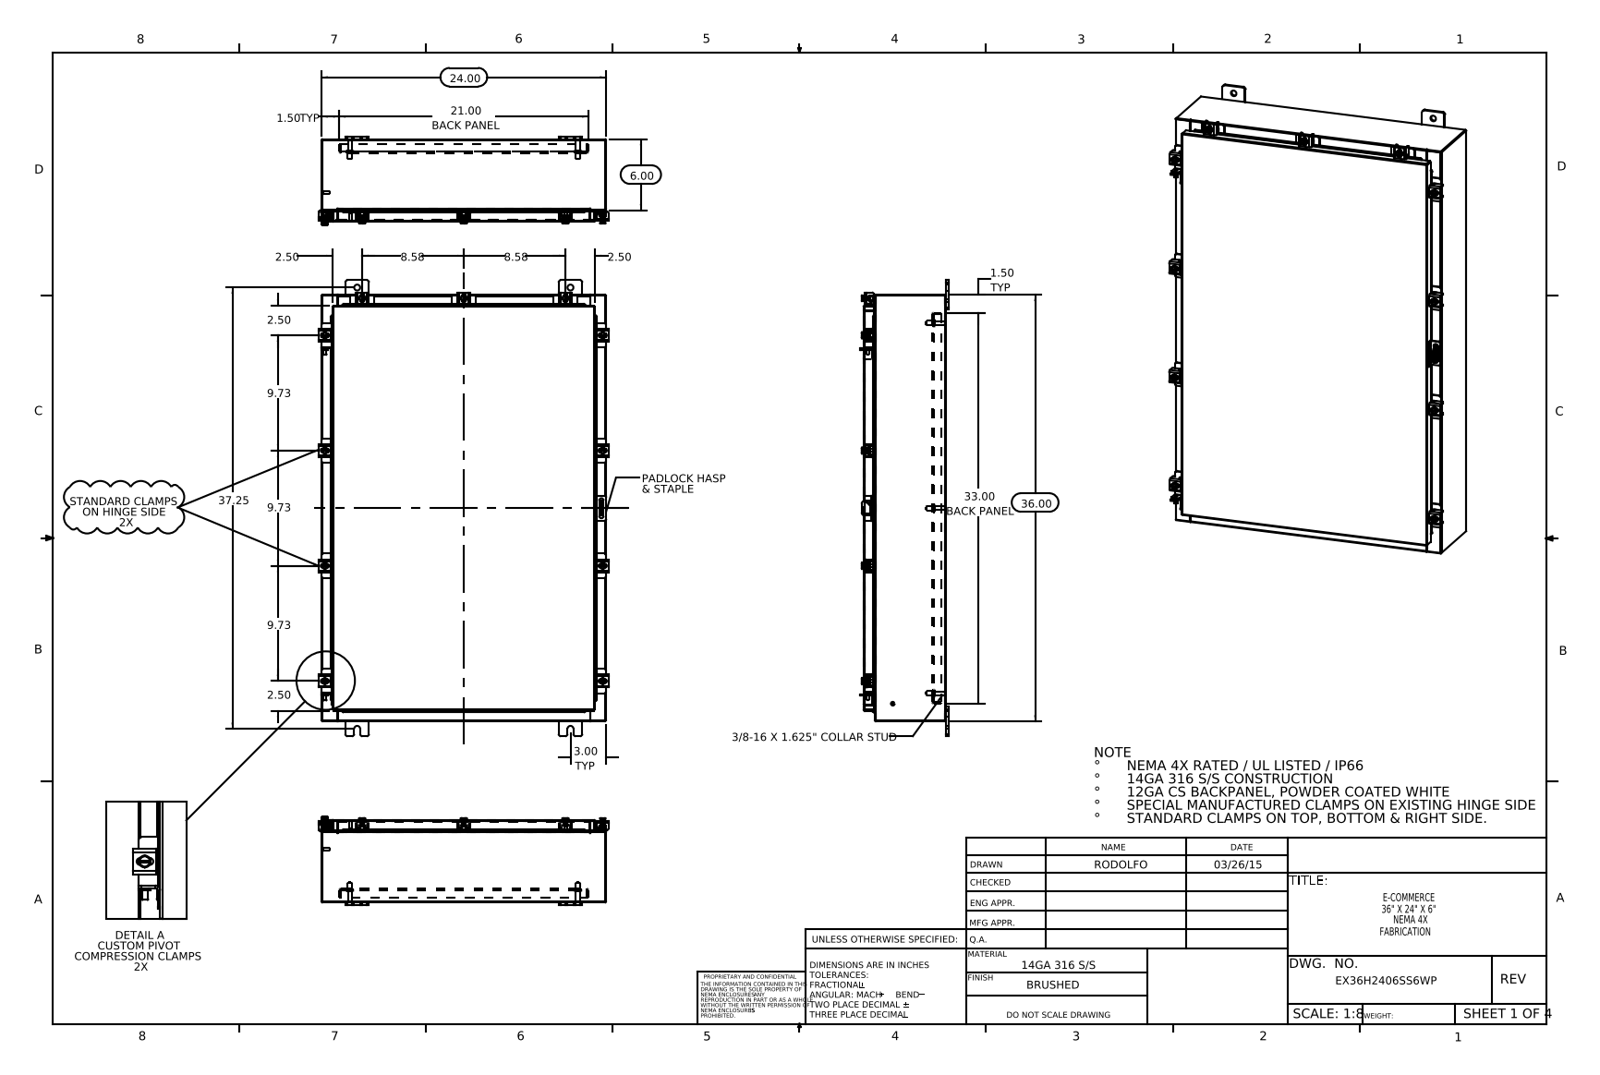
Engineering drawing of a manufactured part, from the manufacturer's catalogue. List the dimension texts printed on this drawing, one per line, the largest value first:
37.25
36.00
33.00 BACK PANEL
24.00
21.00 BACK PANEL
9.73
9.73
9.73
8.58
8.58
6.00
3.00 TYP
2.50
2.50
2.50
2.50
1.50 TYP
1.50 TYP
